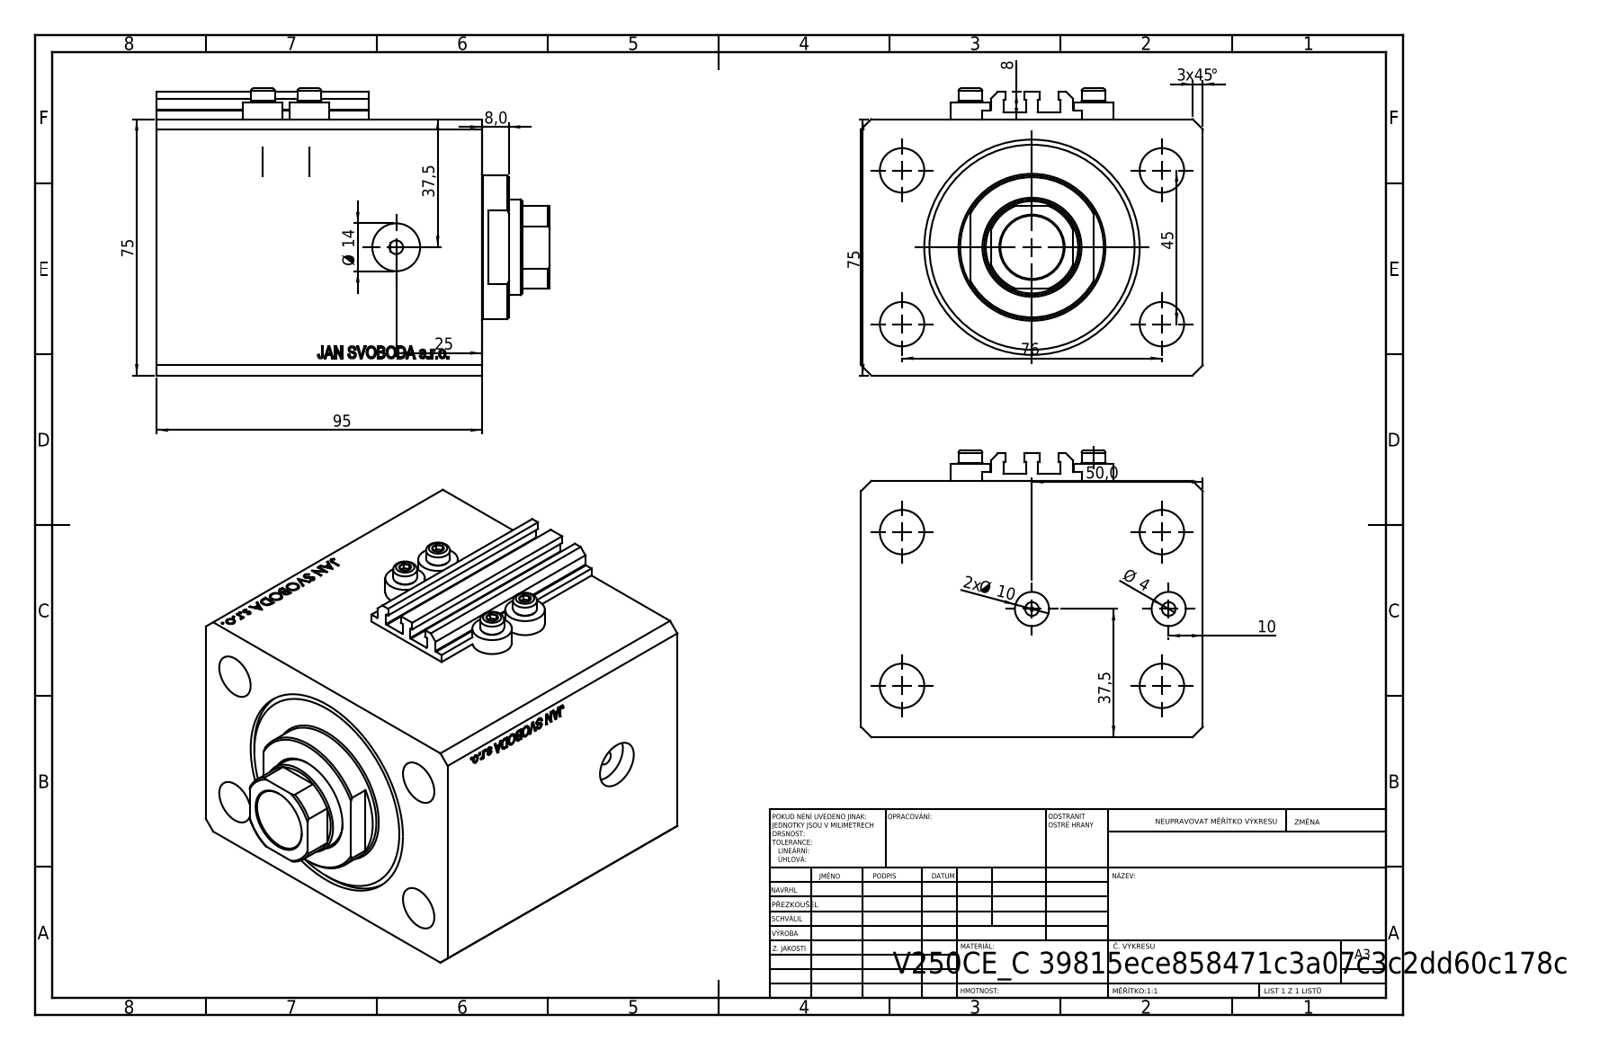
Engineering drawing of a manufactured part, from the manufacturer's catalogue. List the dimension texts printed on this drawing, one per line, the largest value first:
95
76
75
75
50,0
3 x45 °
45
37,5
37,5
25
Ø 14
2x Ø 10
10
8
8,0
Ø 4
